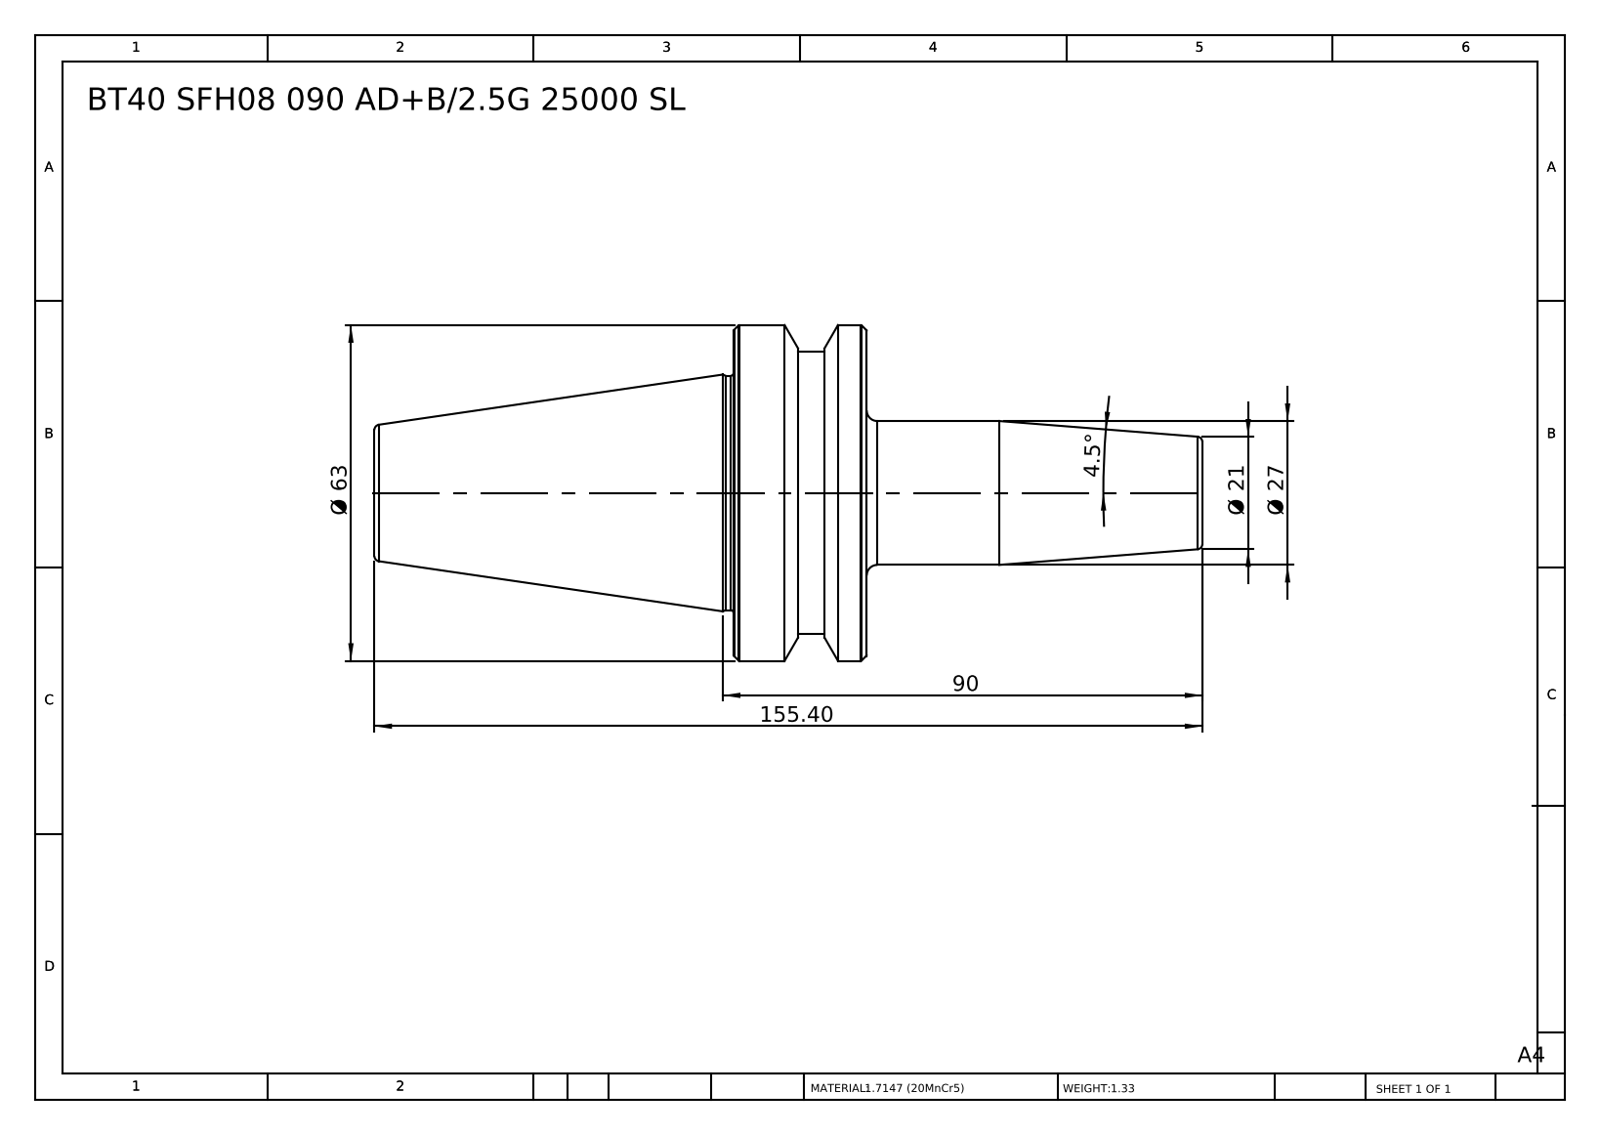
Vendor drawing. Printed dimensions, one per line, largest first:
155.40
90
Ø 63
Ø 27
Ø 21
4.5°
